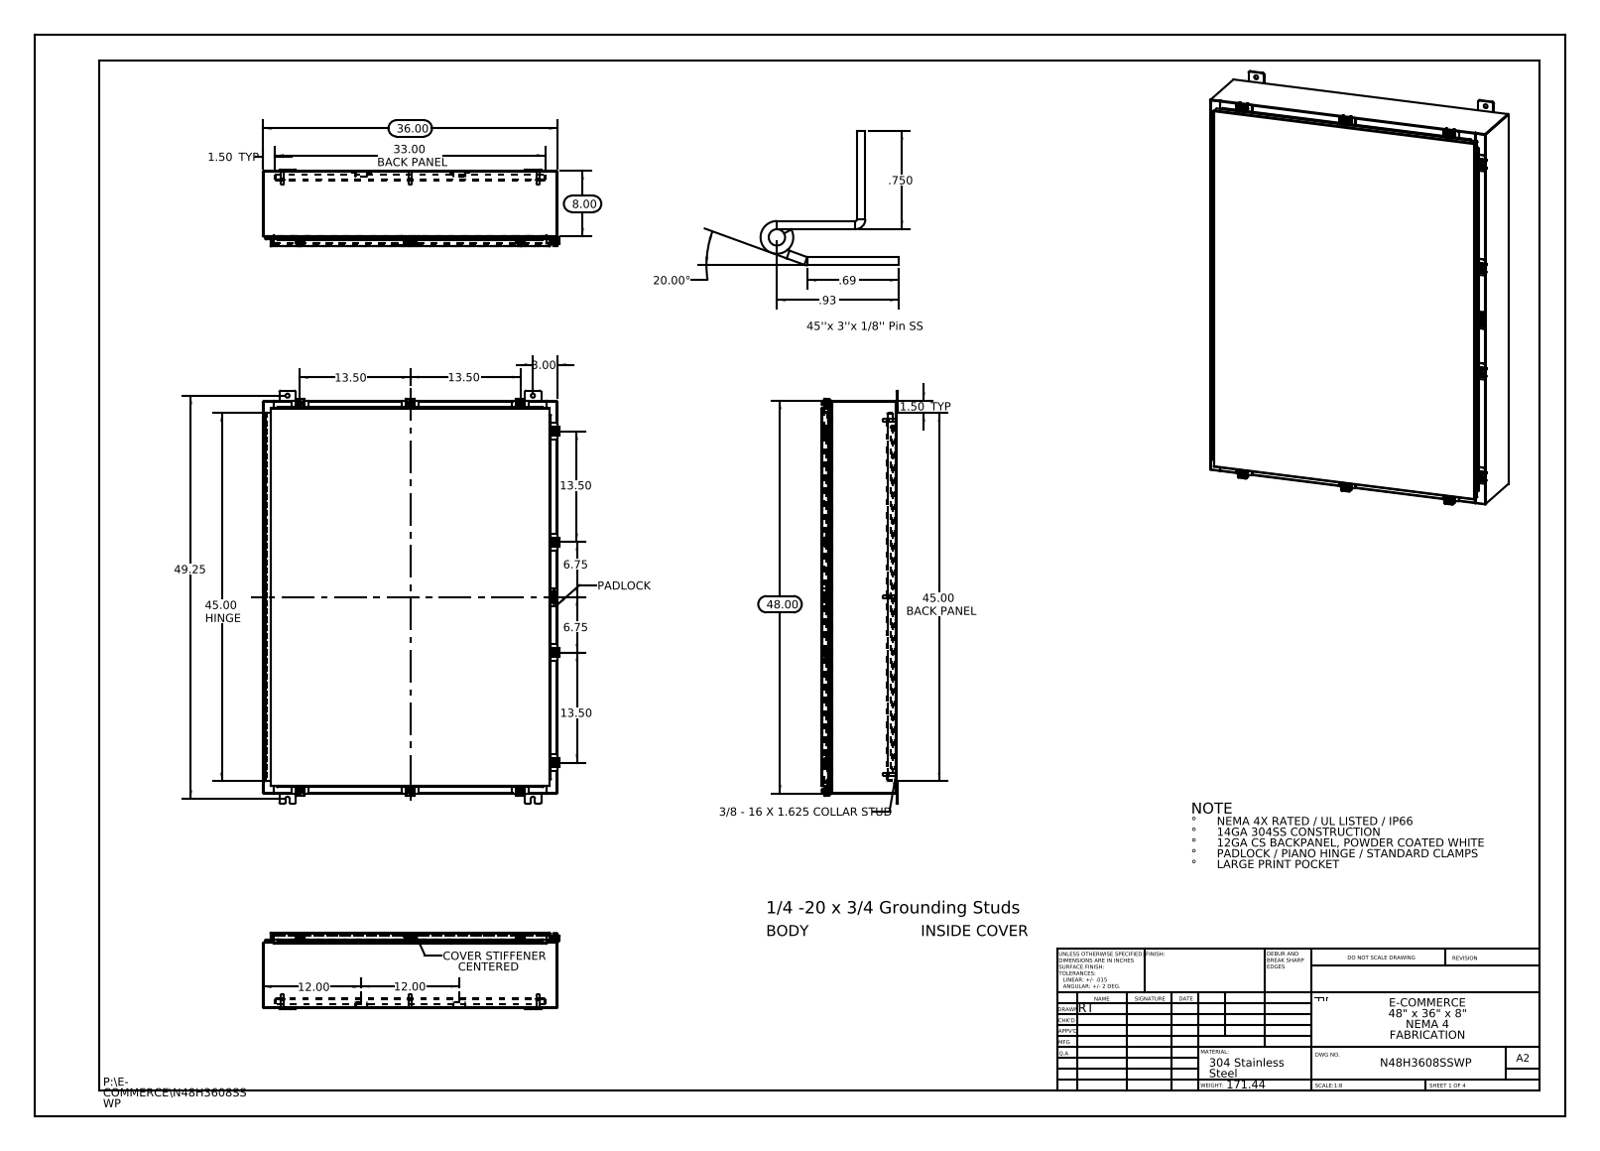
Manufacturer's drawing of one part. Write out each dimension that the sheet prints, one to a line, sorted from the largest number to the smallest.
49.25
48.00
45.00 HINGE
45.00 BACK PANEL
36.00
33.00 BACK PANEL
20.00°
13.50
13.50
13.50
13.50
12.00
12.00
8.00
6.75
6.75
3.00
1.50 TYP
1.50 TYP
.93
.750
.69
